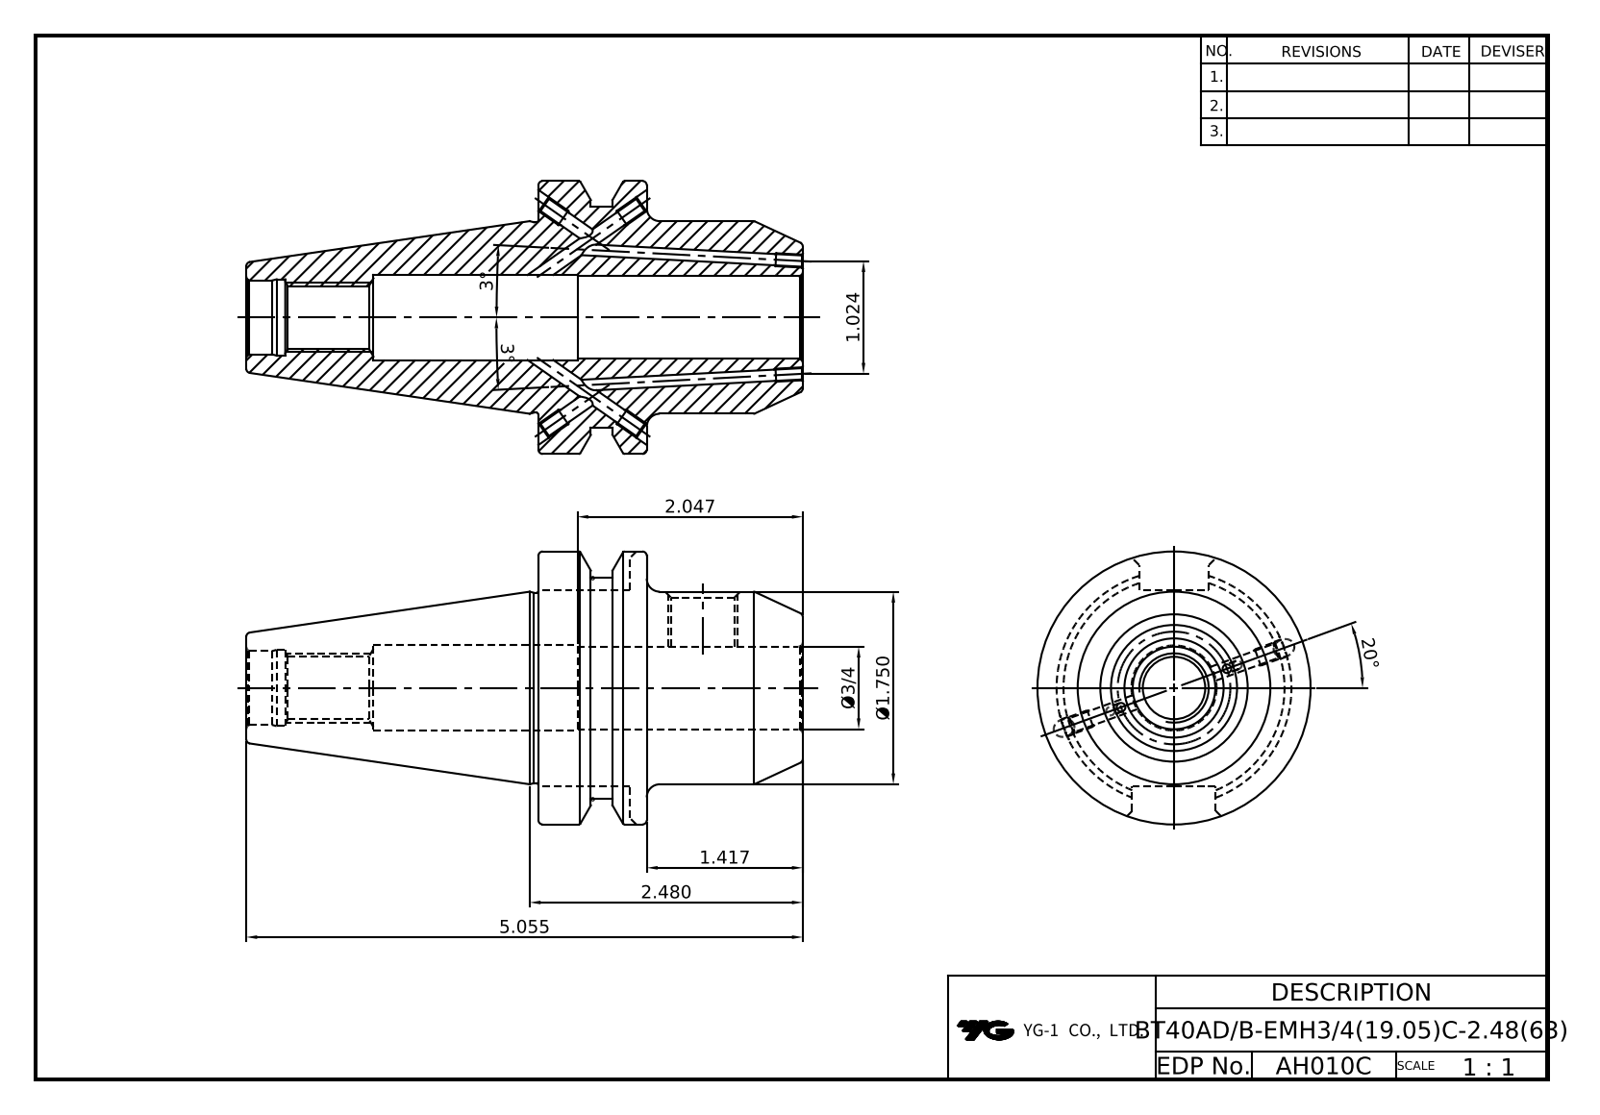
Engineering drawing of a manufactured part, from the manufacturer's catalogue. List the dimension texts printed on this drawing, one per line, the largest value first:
20°
5.055
3°
3°
2.480
2.047
Ø1.750
1.417
1.024
Ø3/4
